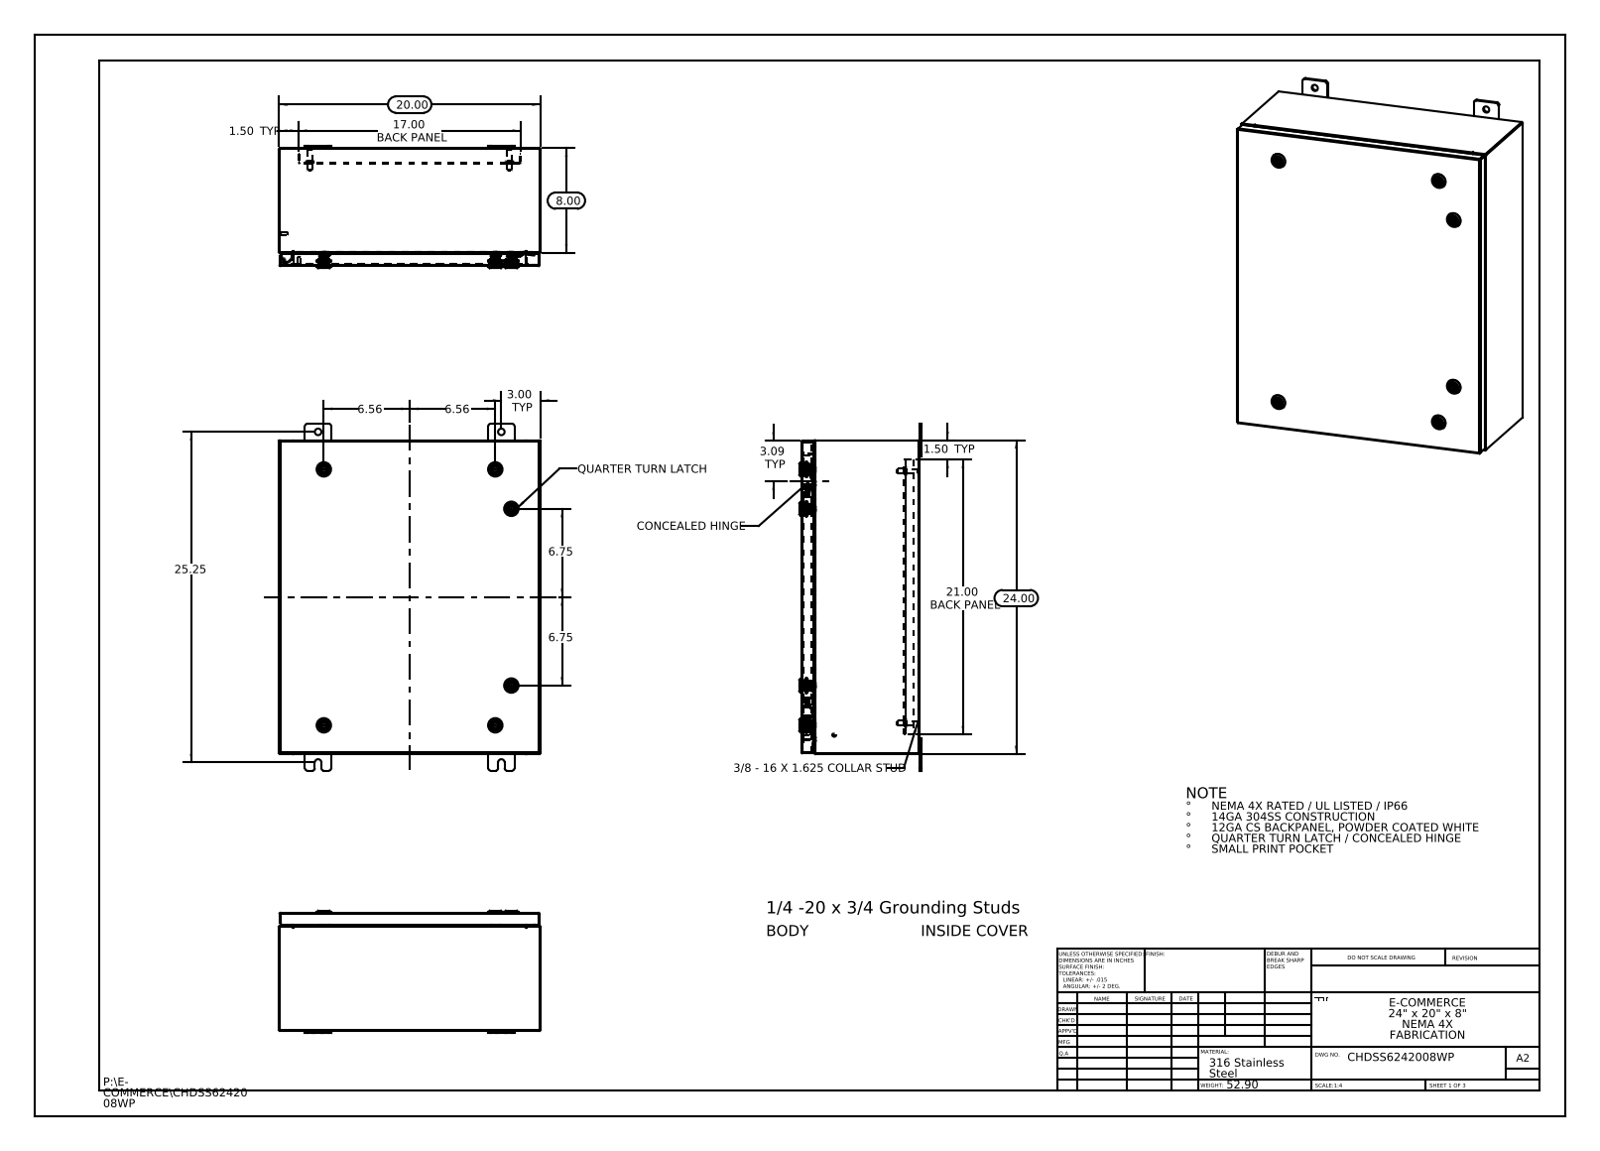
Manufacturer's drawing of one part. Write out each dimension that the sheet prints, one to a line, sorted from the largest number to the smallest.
25.25
24.00
21.00 BACK PANEL
20.00
17.00 BACK PANEL
8.00
6.75
6.75
6.56
6.56
3.09 TYP
3.00 TYP
1.50 TYP
1.50 TYP
